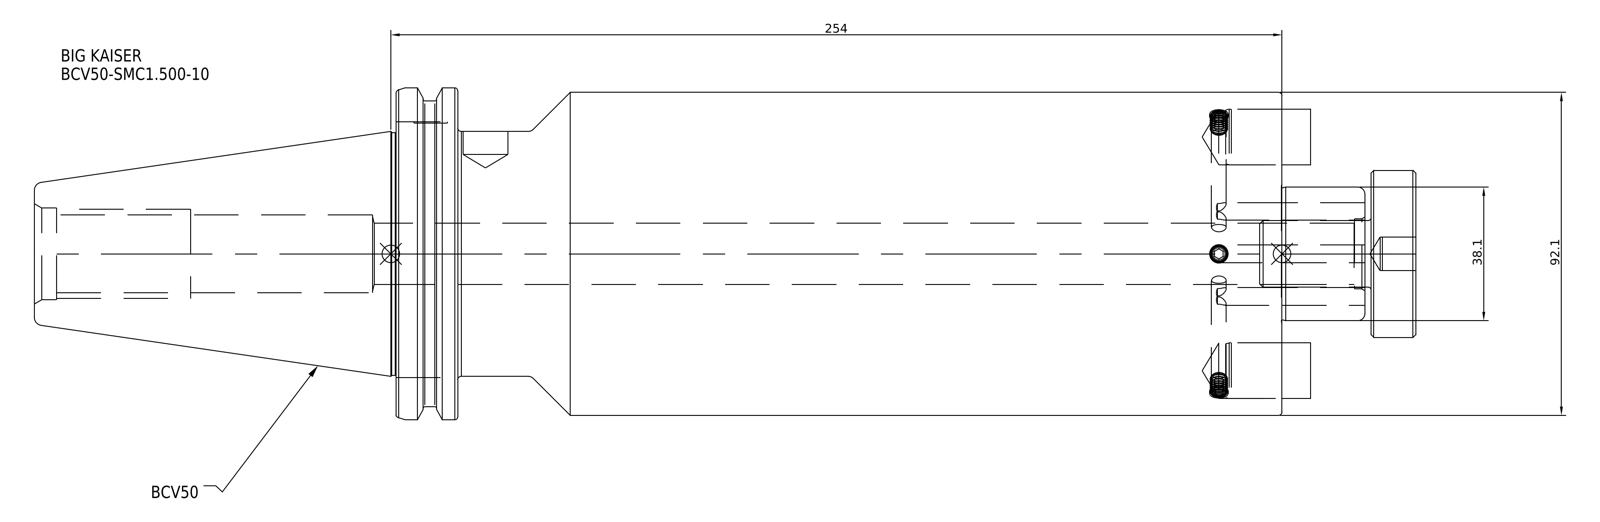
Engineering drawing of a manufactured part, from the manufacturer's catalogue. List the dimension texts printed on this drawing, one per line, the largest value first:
254
92.1
38.1
